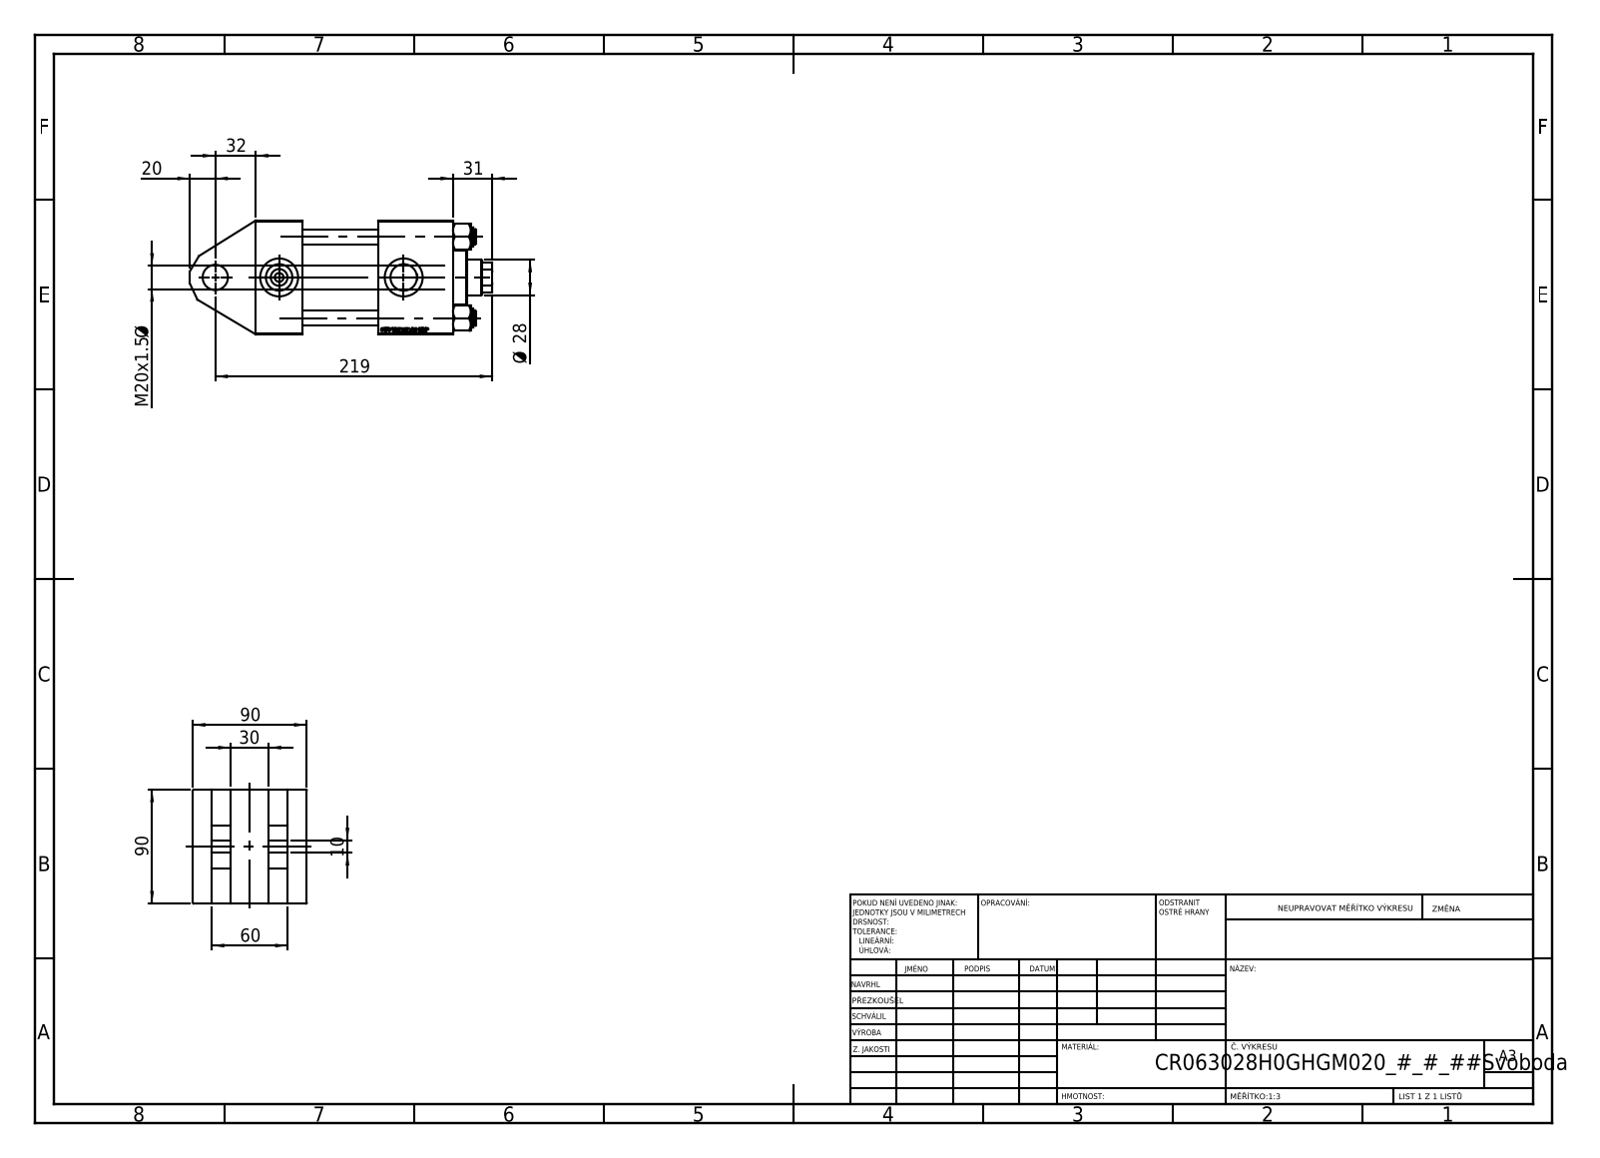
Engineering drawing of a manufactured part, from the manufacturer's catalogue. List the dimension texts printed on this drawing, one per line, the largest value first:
219
90
90
60
32
31
30
Ø 28
20
M20x1.5 Ø
10
